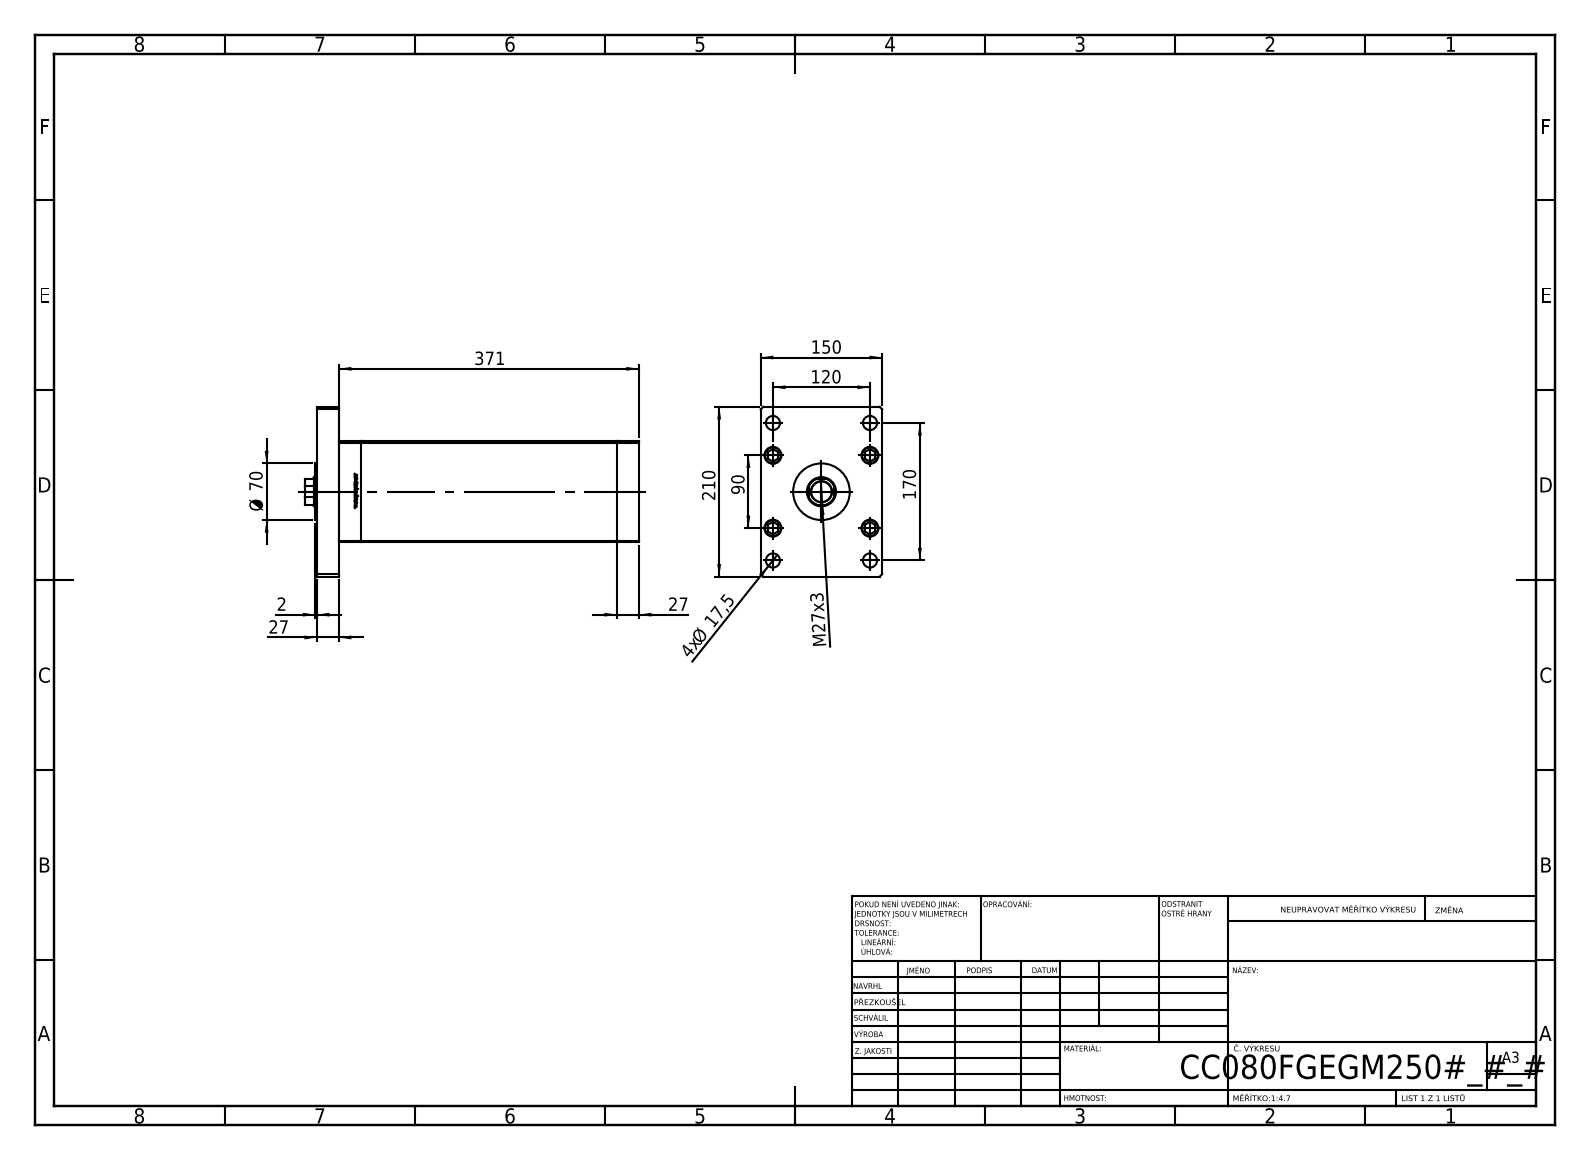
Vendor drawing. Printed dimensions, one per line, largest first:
371
210
170
150
120
90
Ø 70
27
27
M27x3
4x Ø 17,5
2
